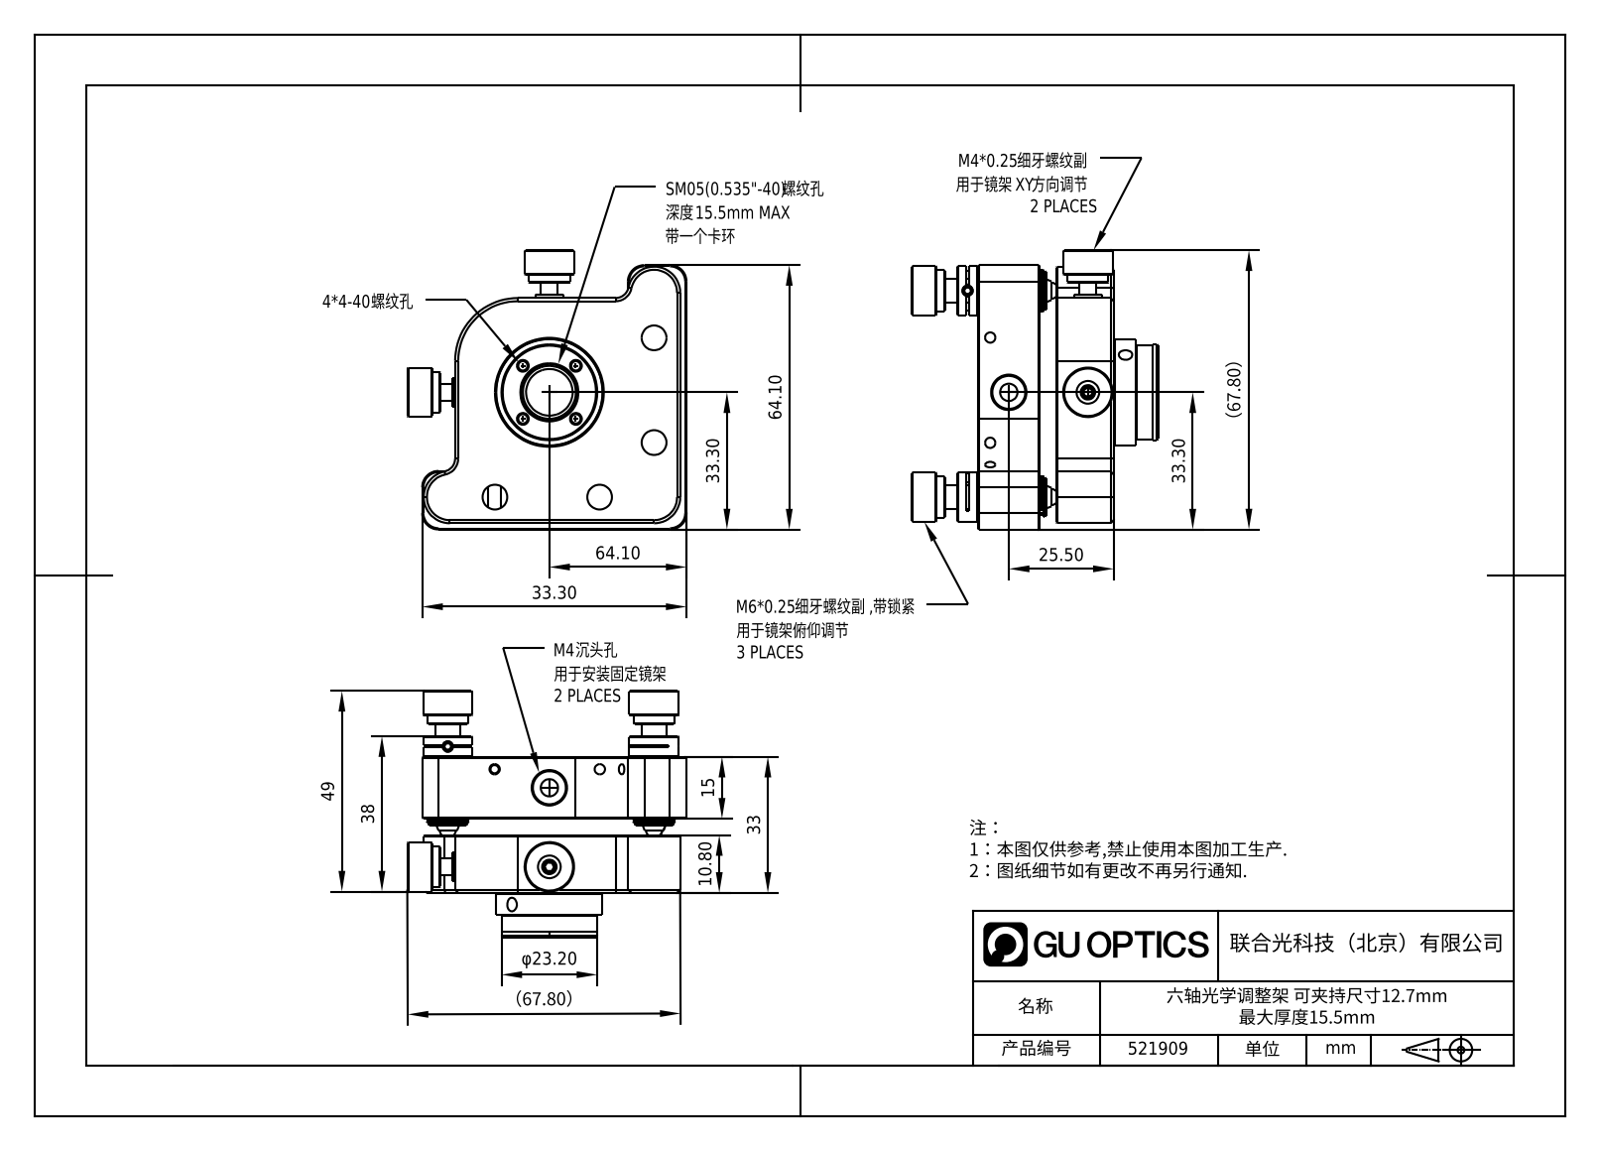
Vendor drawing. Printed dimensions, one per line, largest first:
（67.80）
（67.80）
64.10
64.10
49
38
33.30
33.30
33.30
33
25.50
φ23.20
15
10.80
